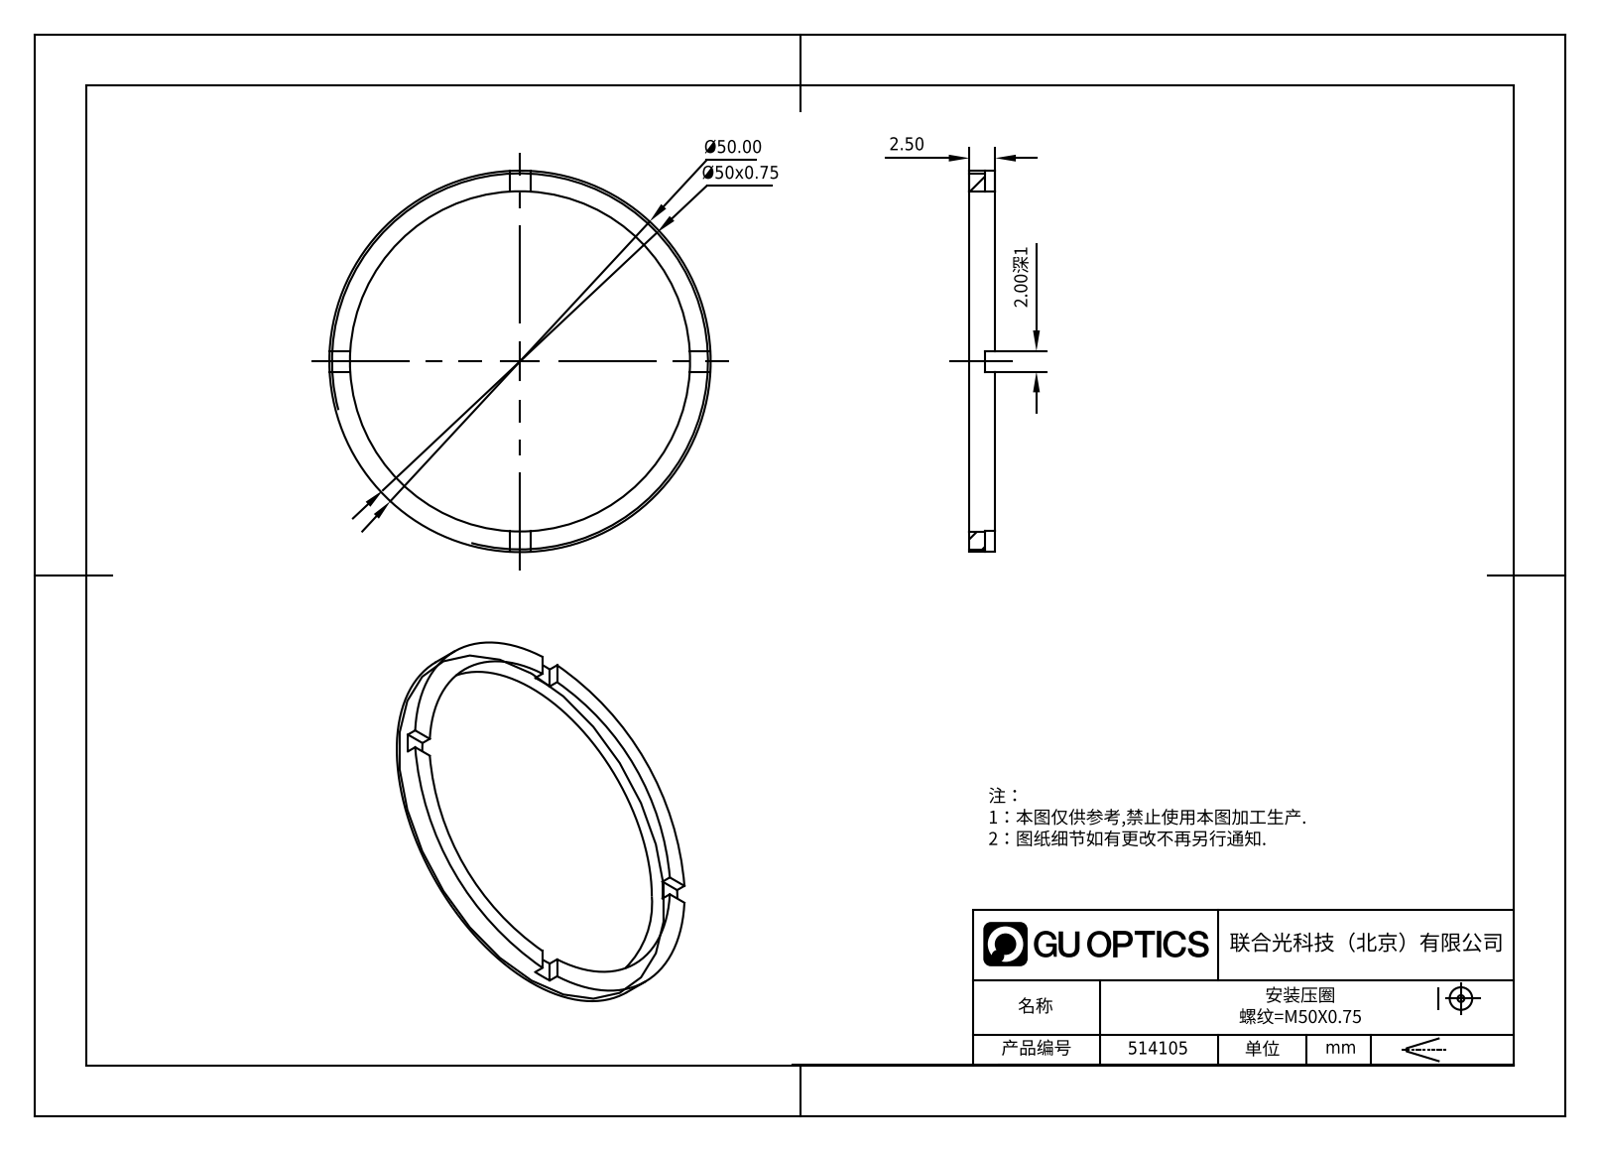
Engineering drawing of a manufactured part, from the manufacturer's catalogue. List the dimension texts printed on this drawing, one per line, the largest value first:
Ø50.00
Ø50x0.75
2.50
2.00深1
